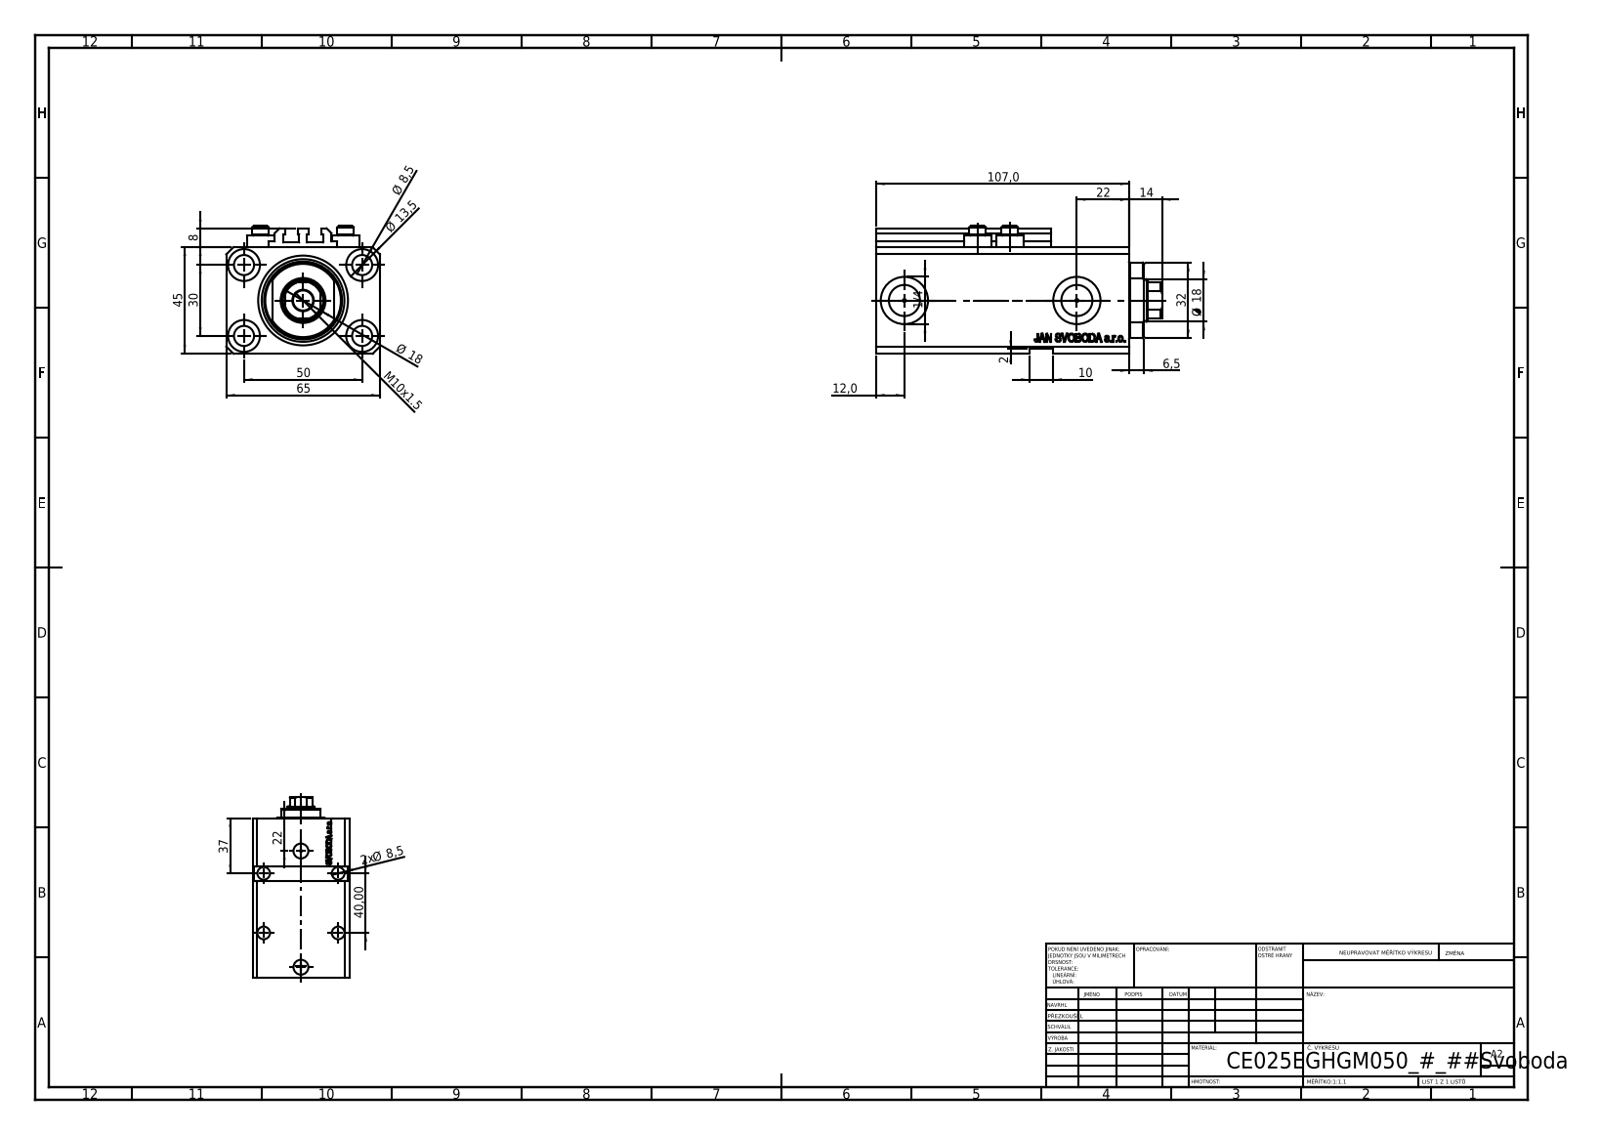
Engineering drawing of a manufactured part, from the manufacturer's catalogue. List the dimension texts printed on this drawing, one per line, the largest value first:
107,0
65
50
45
40,00
37
32
30
22
22
Ø 18
Ø 18
14
Ø 13,5
12,0
M10x1.5
10
Ø 8,5
2x Ø 8,5
8
6,5
2
1/4
